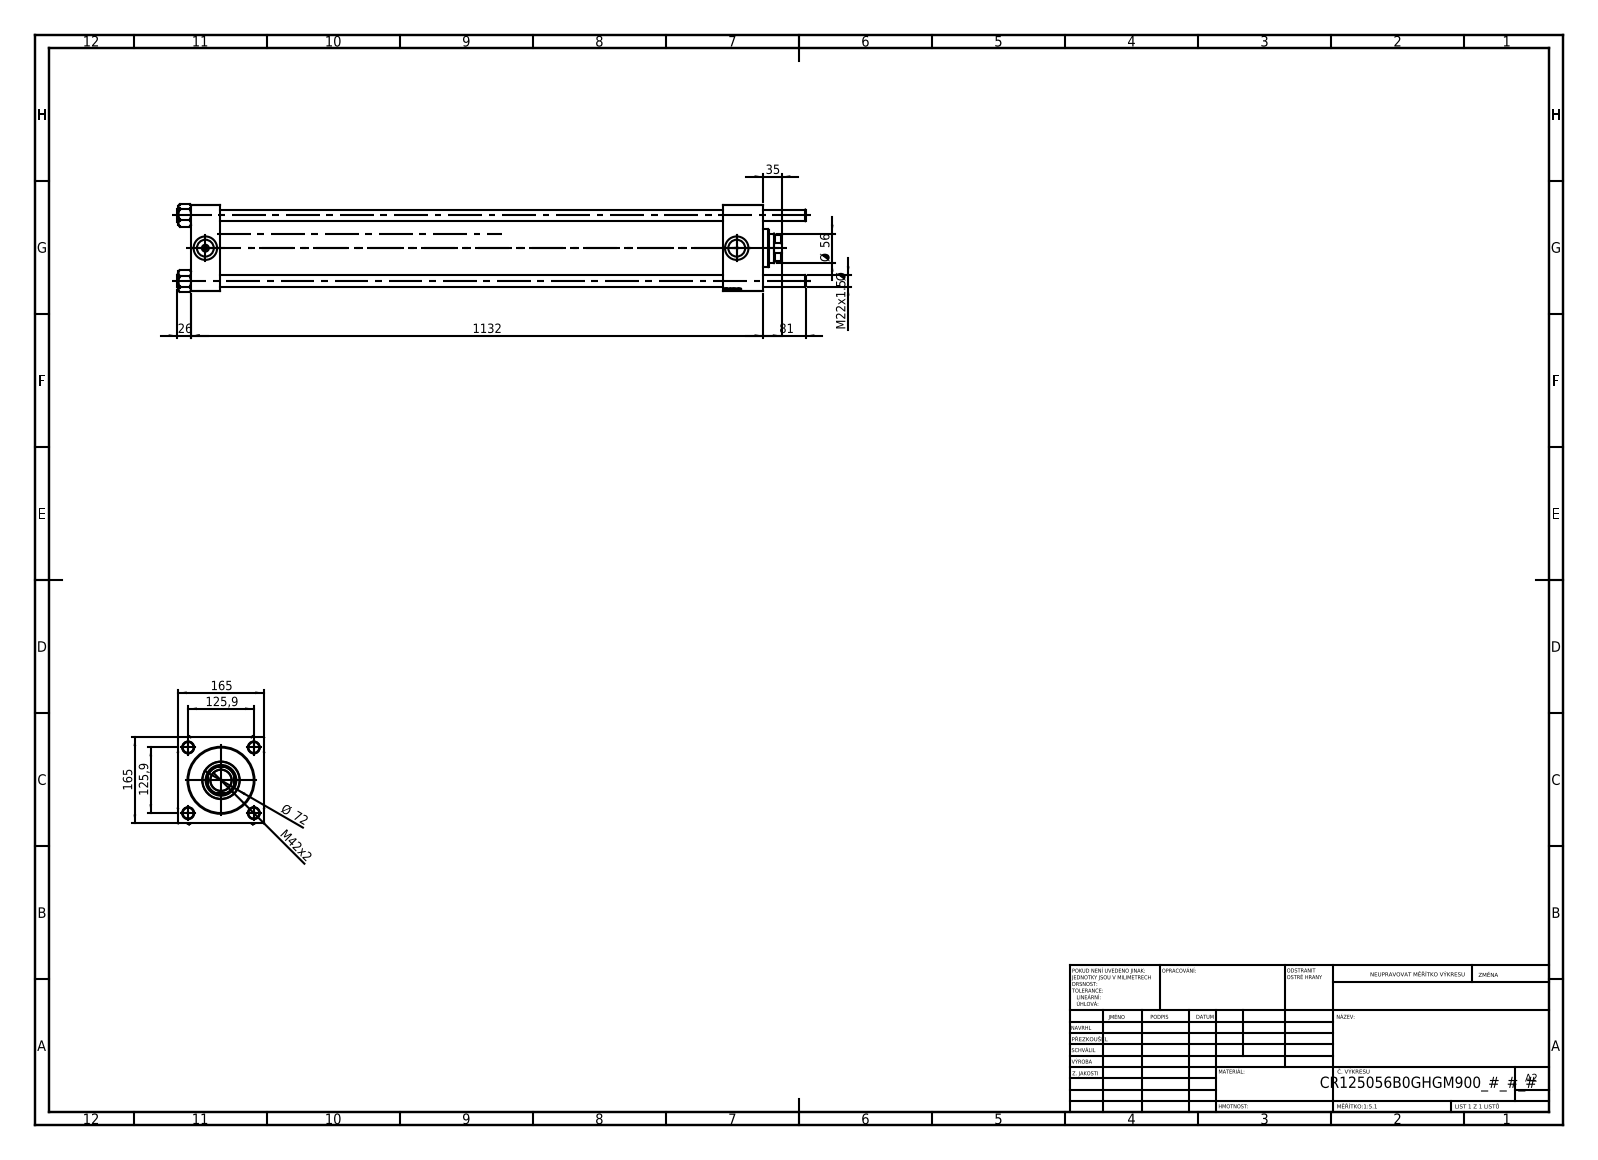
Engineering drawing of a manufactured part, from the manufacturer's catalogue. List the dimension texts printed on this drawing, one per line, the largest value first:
1132
165
165
125,9
125,9
81
Ø 72
Ø 56
M42x2
35
26
M22x1.5 Ø
